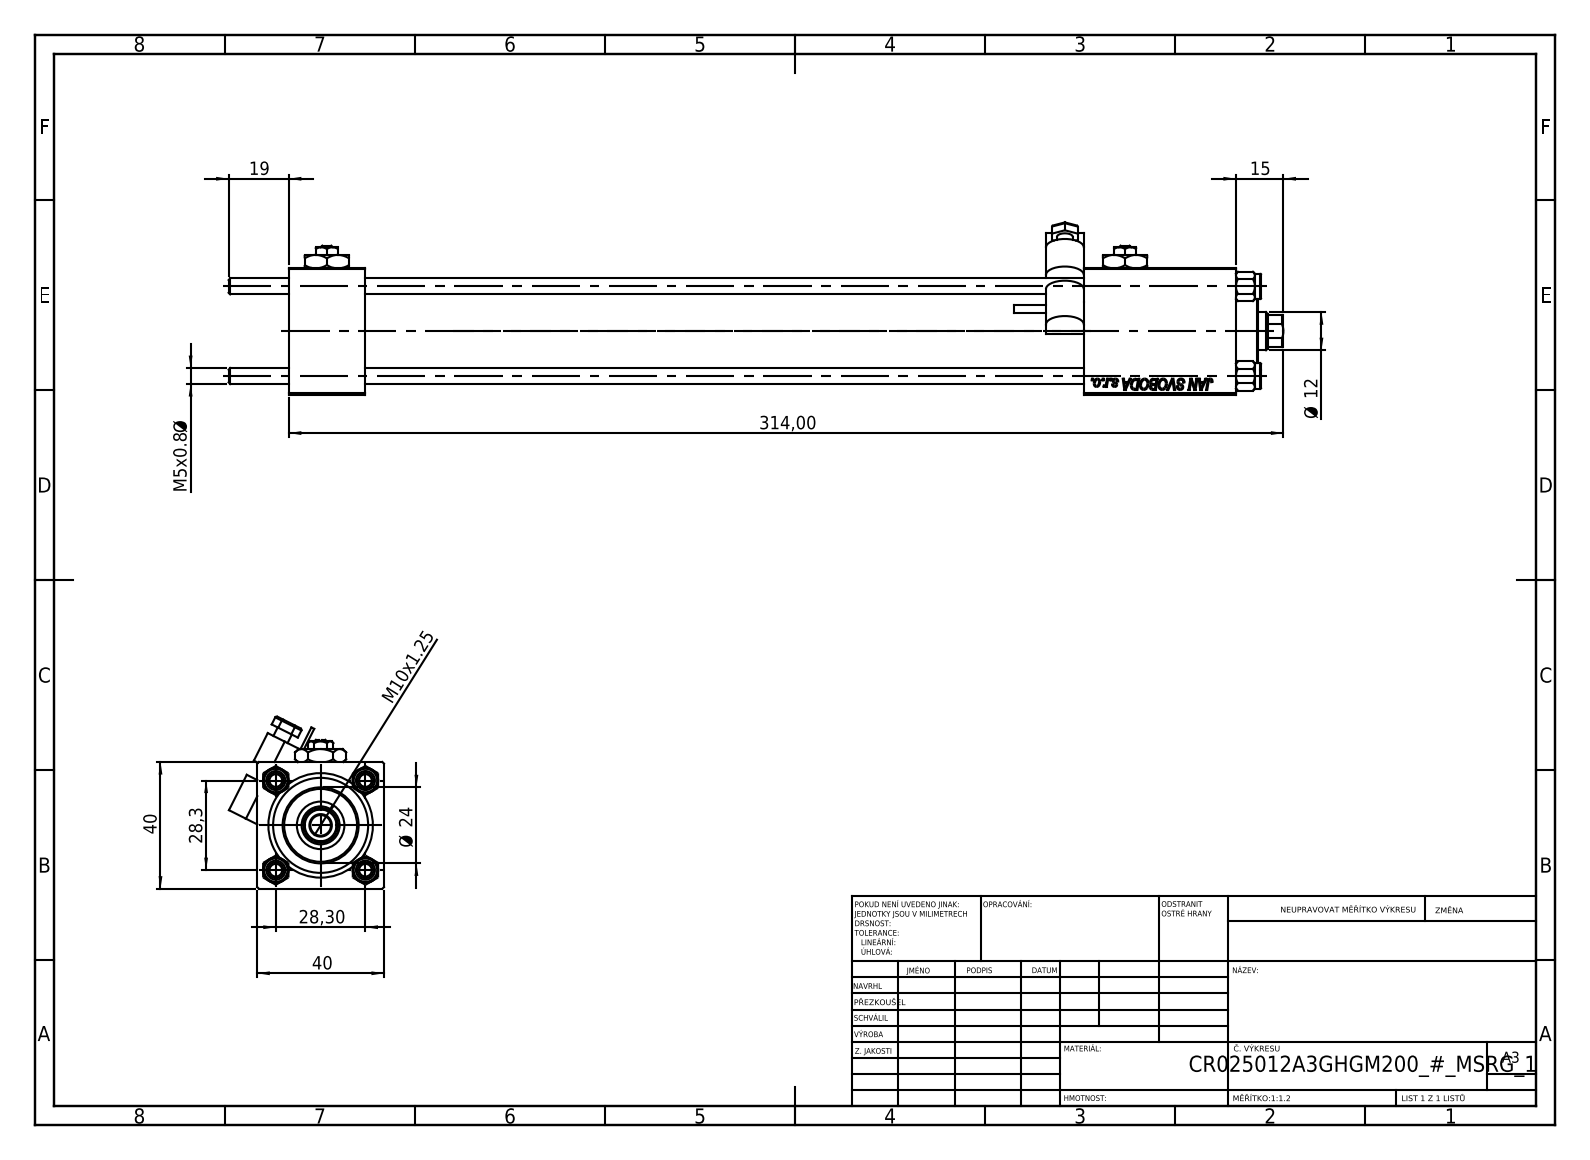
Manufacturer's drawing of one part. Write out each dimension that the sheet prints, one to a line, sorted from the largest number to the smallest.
314,00
40
40
28,3
28,30
Ø 24
19
15
Ø 12
M10x1.25
M5x0.8 Ø
